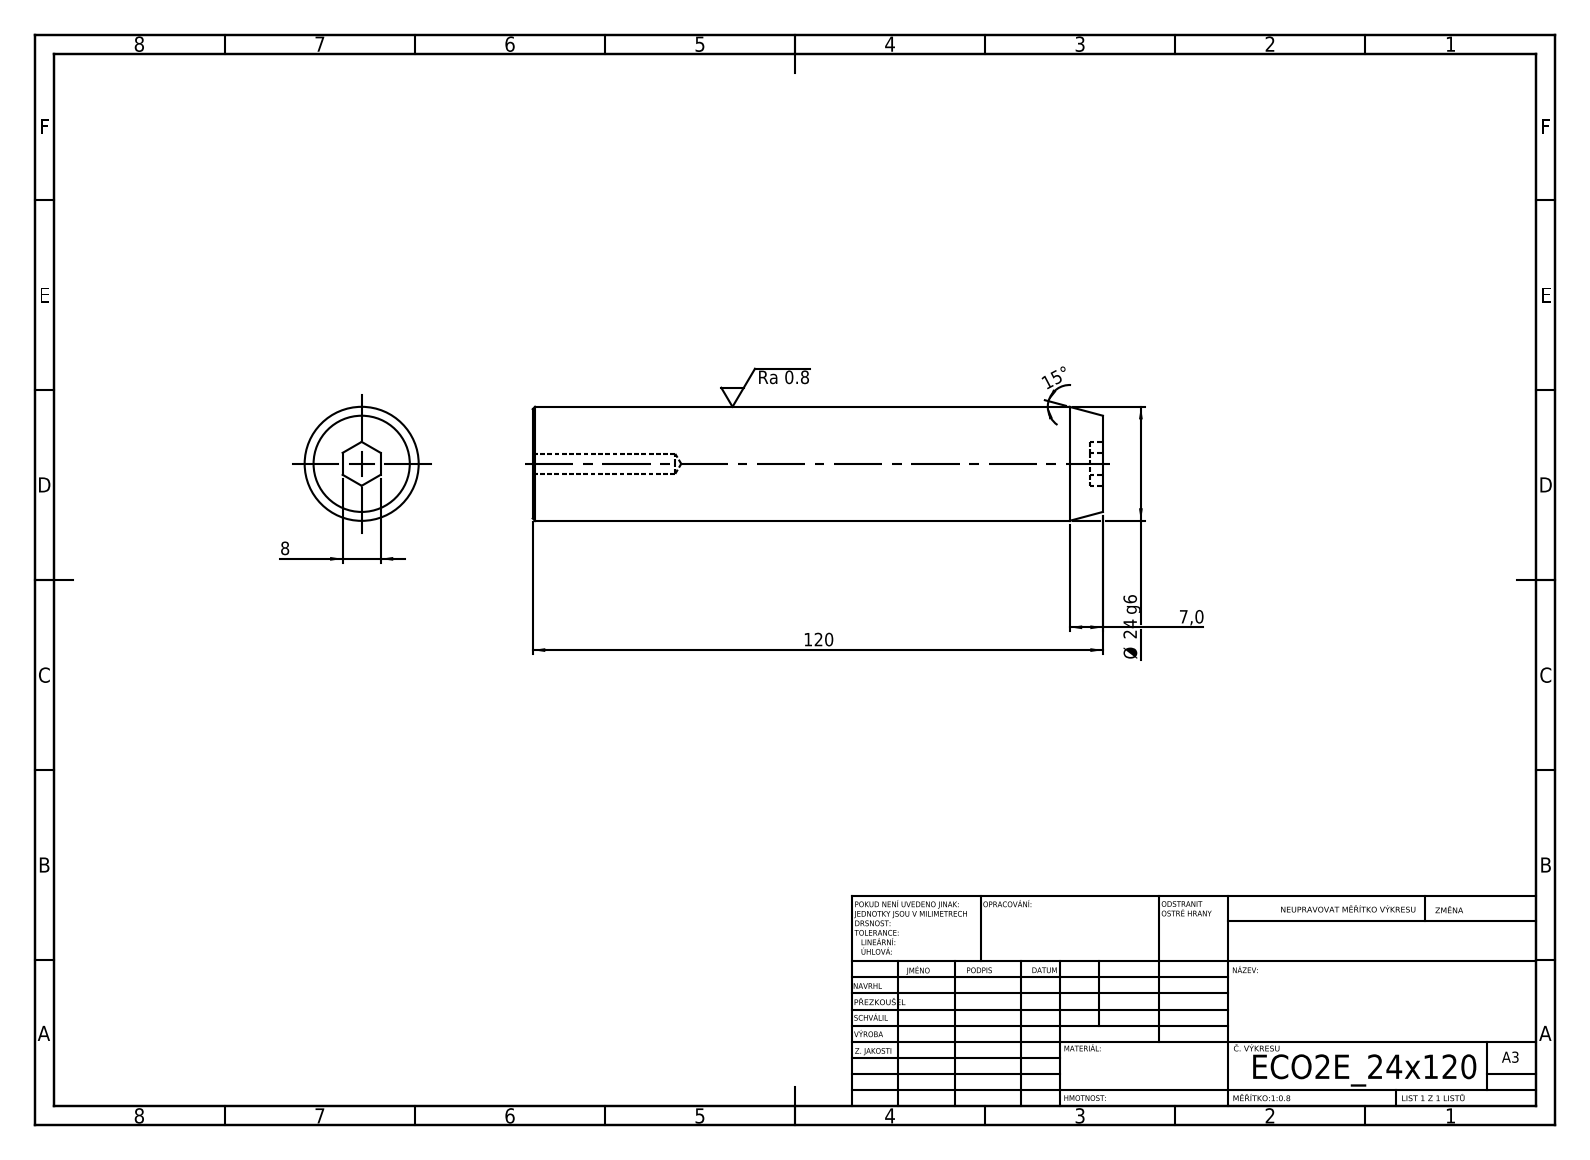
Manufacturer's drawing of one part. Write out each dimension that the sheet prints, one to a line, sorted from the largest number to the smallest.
120
Ø 24 g6
15°
8
7,0
